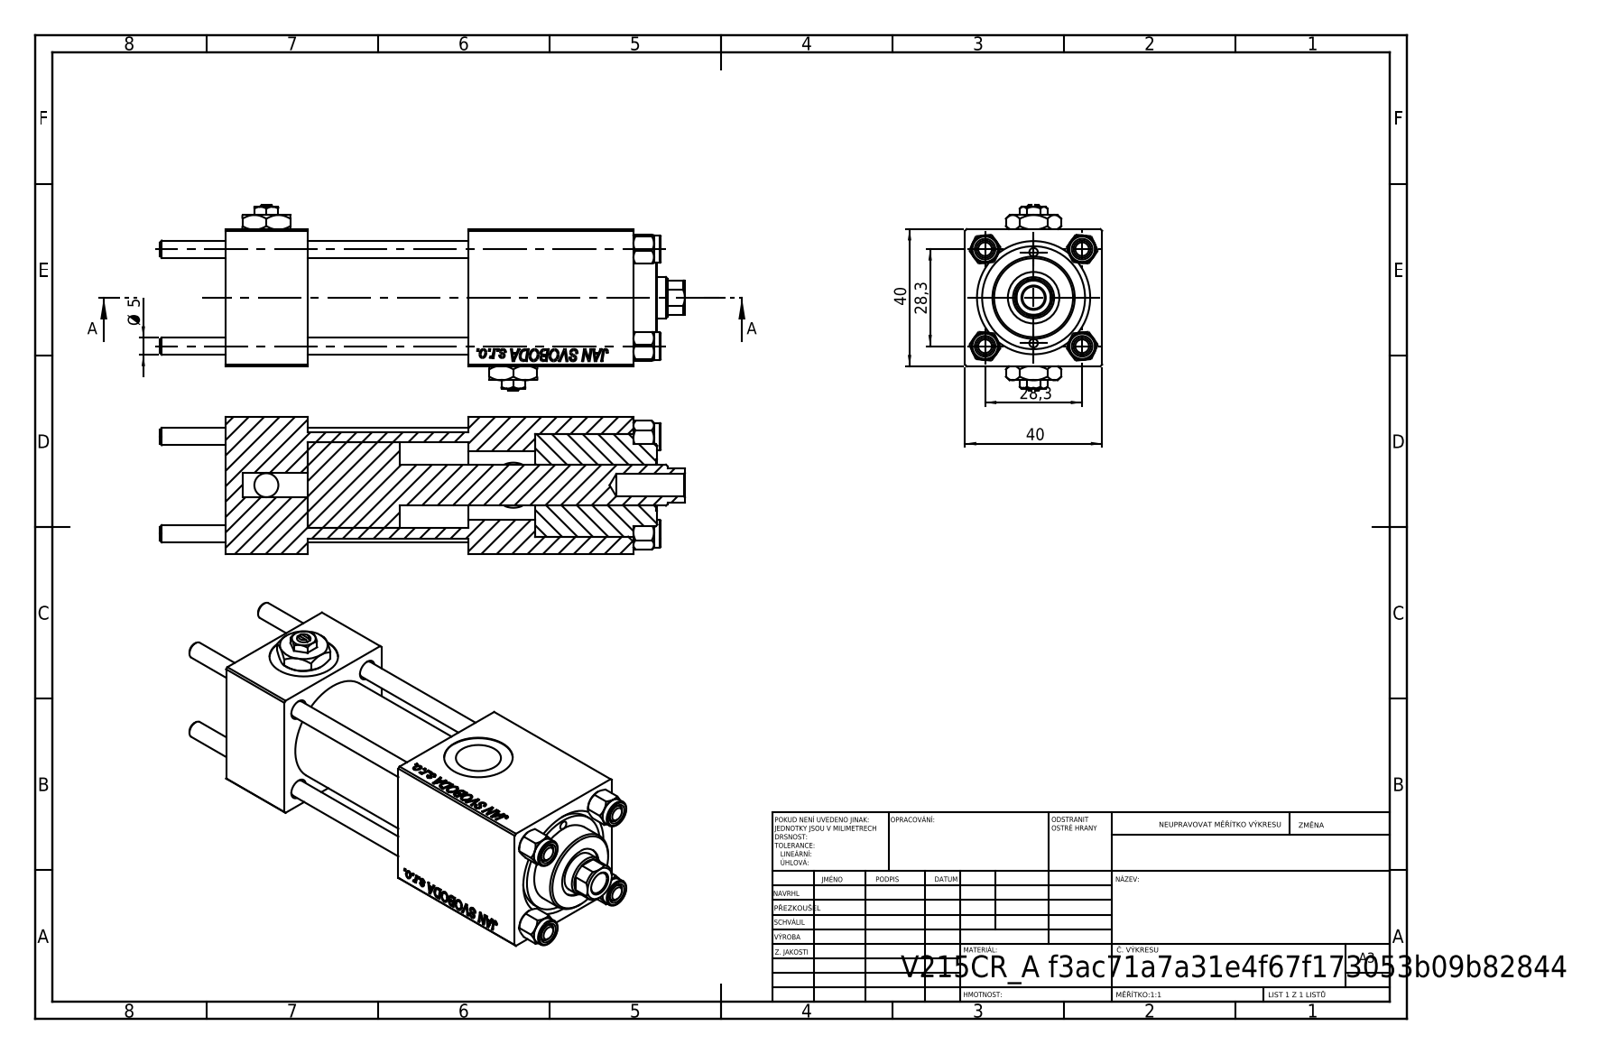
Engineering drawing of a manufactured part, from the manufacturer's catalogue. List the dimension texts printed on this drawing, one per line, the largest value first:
40
40
28,3
28,3
Ø 5
